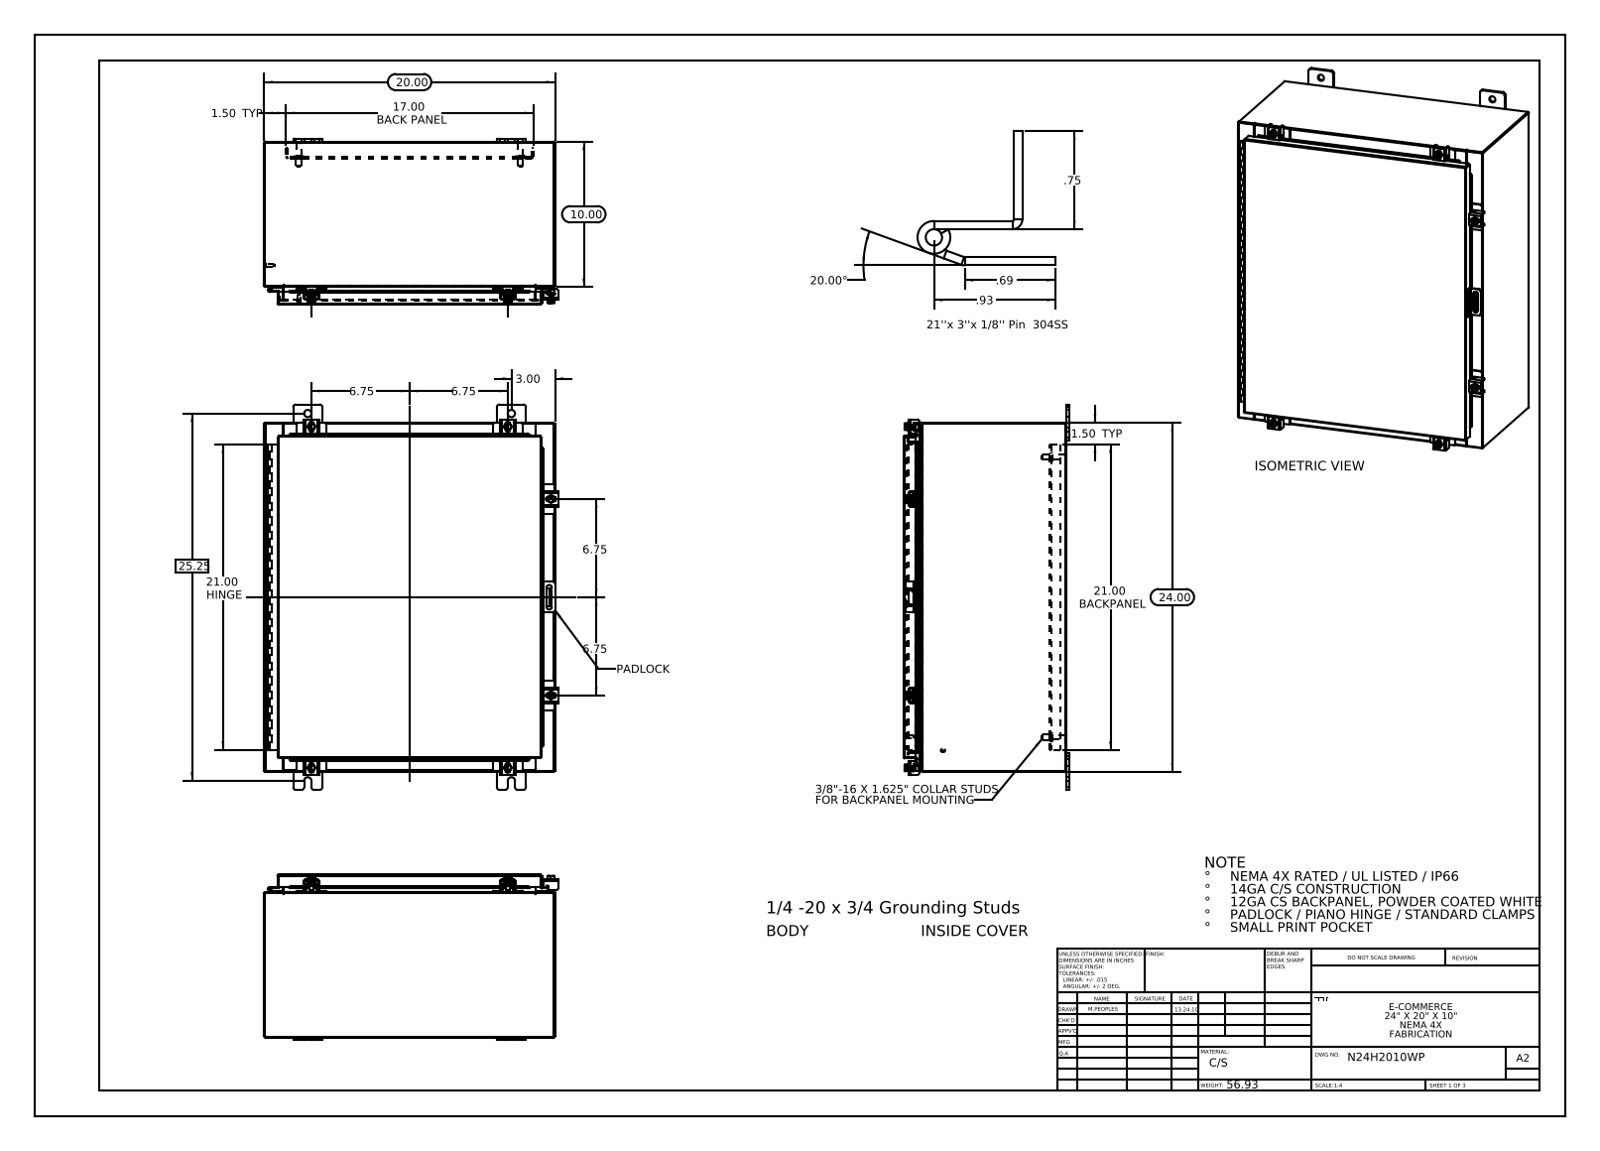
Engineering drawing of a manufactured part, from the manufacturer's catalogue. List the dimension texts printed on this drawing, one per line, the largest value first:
25.25
24.00
21.00 HINGE
21.00 BACKPANEL
20.00
20.00°
17.00 BACK PANEL
10.00
6.75
6.75
6.75
6.75
3.00
1.50 TYP
1.50 TYP
.93
.75
.69
